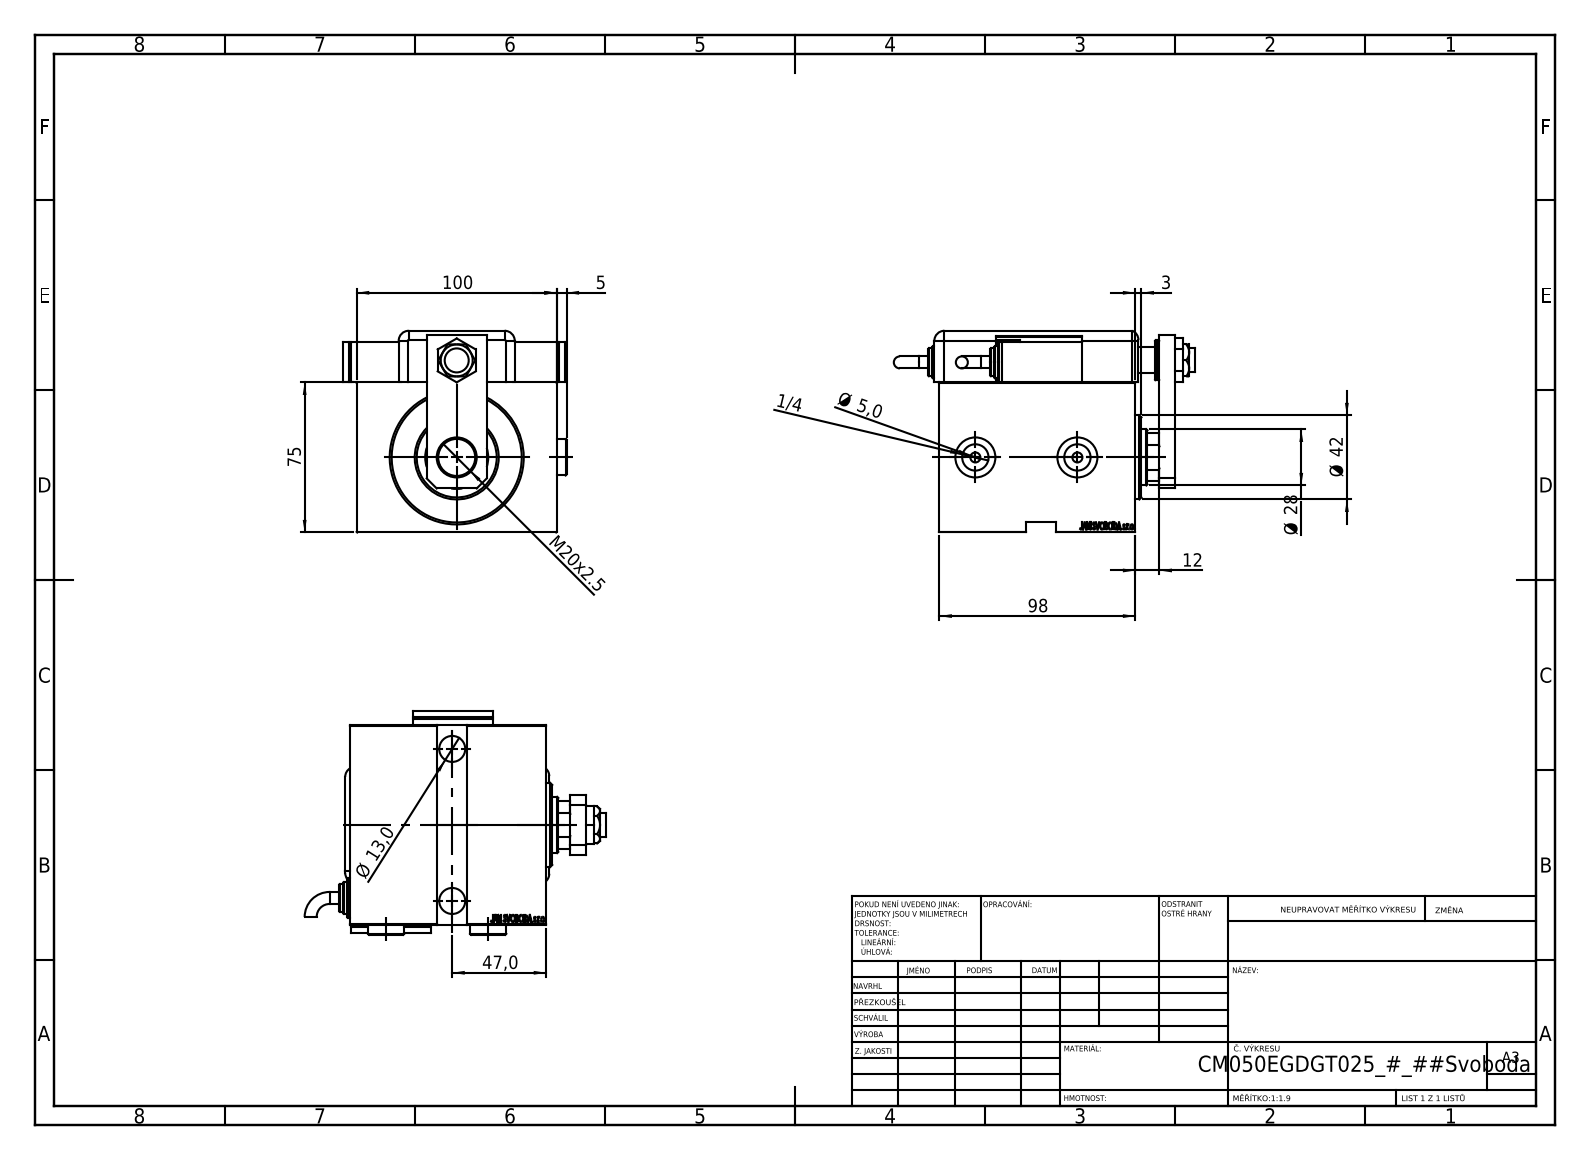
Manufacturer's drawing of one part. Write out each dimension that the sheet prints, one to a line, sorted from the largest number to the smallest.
100
98
75
47,0
Ø 42
Ø 28
M20x2.5
Ø 13,0
12
5
Ø 5,0
3
1/4
